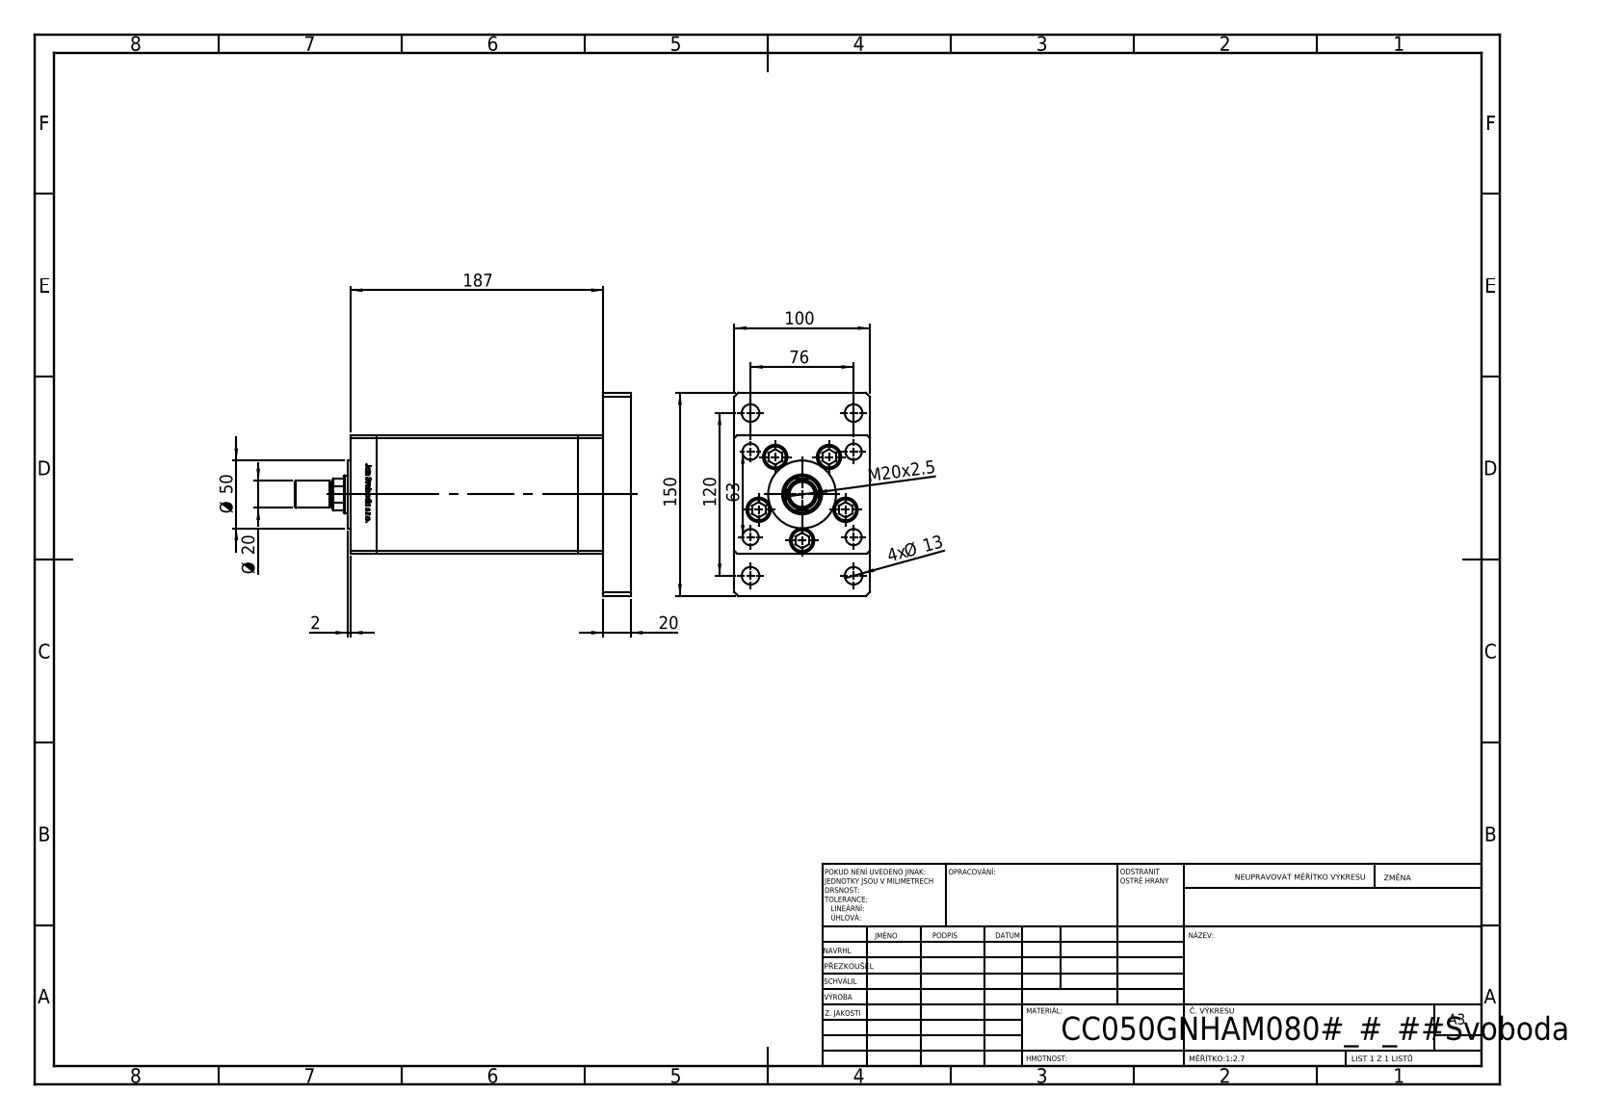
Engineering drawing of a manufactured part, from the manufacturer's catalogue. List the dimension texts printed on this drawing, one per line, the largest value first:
187
150
120
100
76
63
Ø 50
20
Ø 20
M20x2.5
4x Ø 13
2
